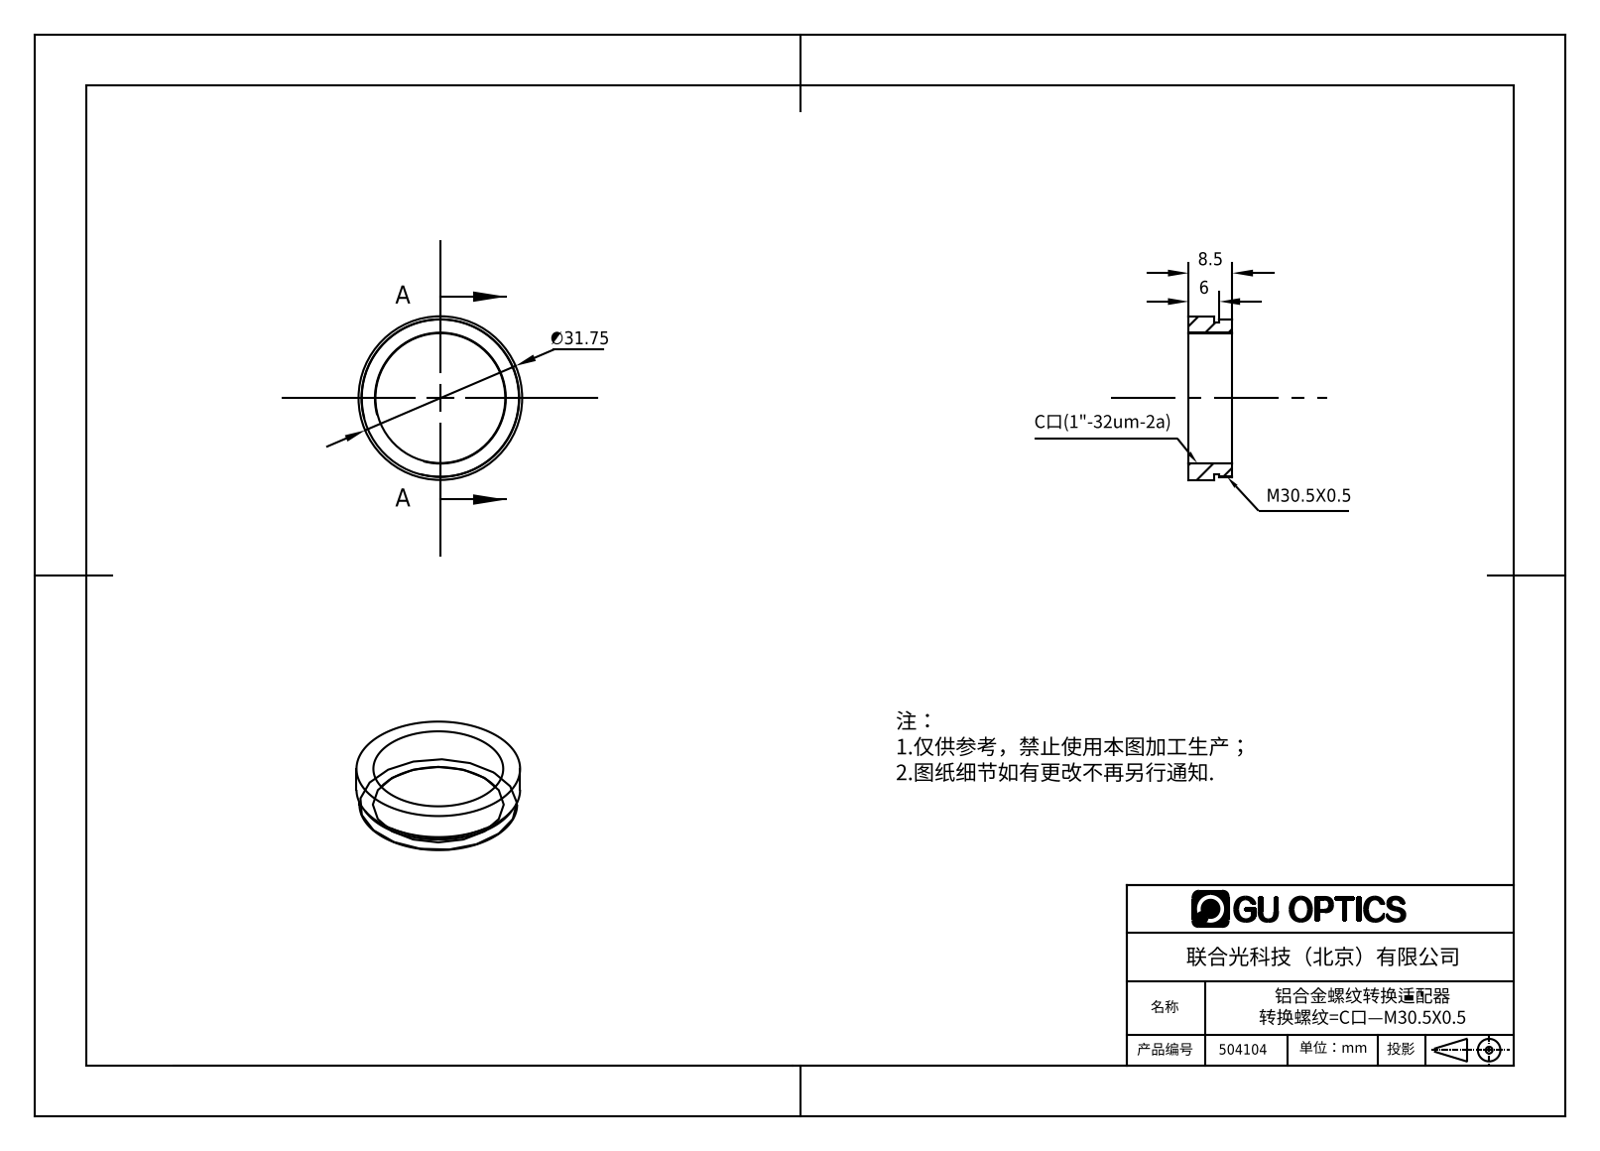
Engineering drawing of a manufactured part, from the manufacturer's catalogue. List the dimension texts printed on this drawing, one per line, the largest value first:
∅31.75
8.5
6
